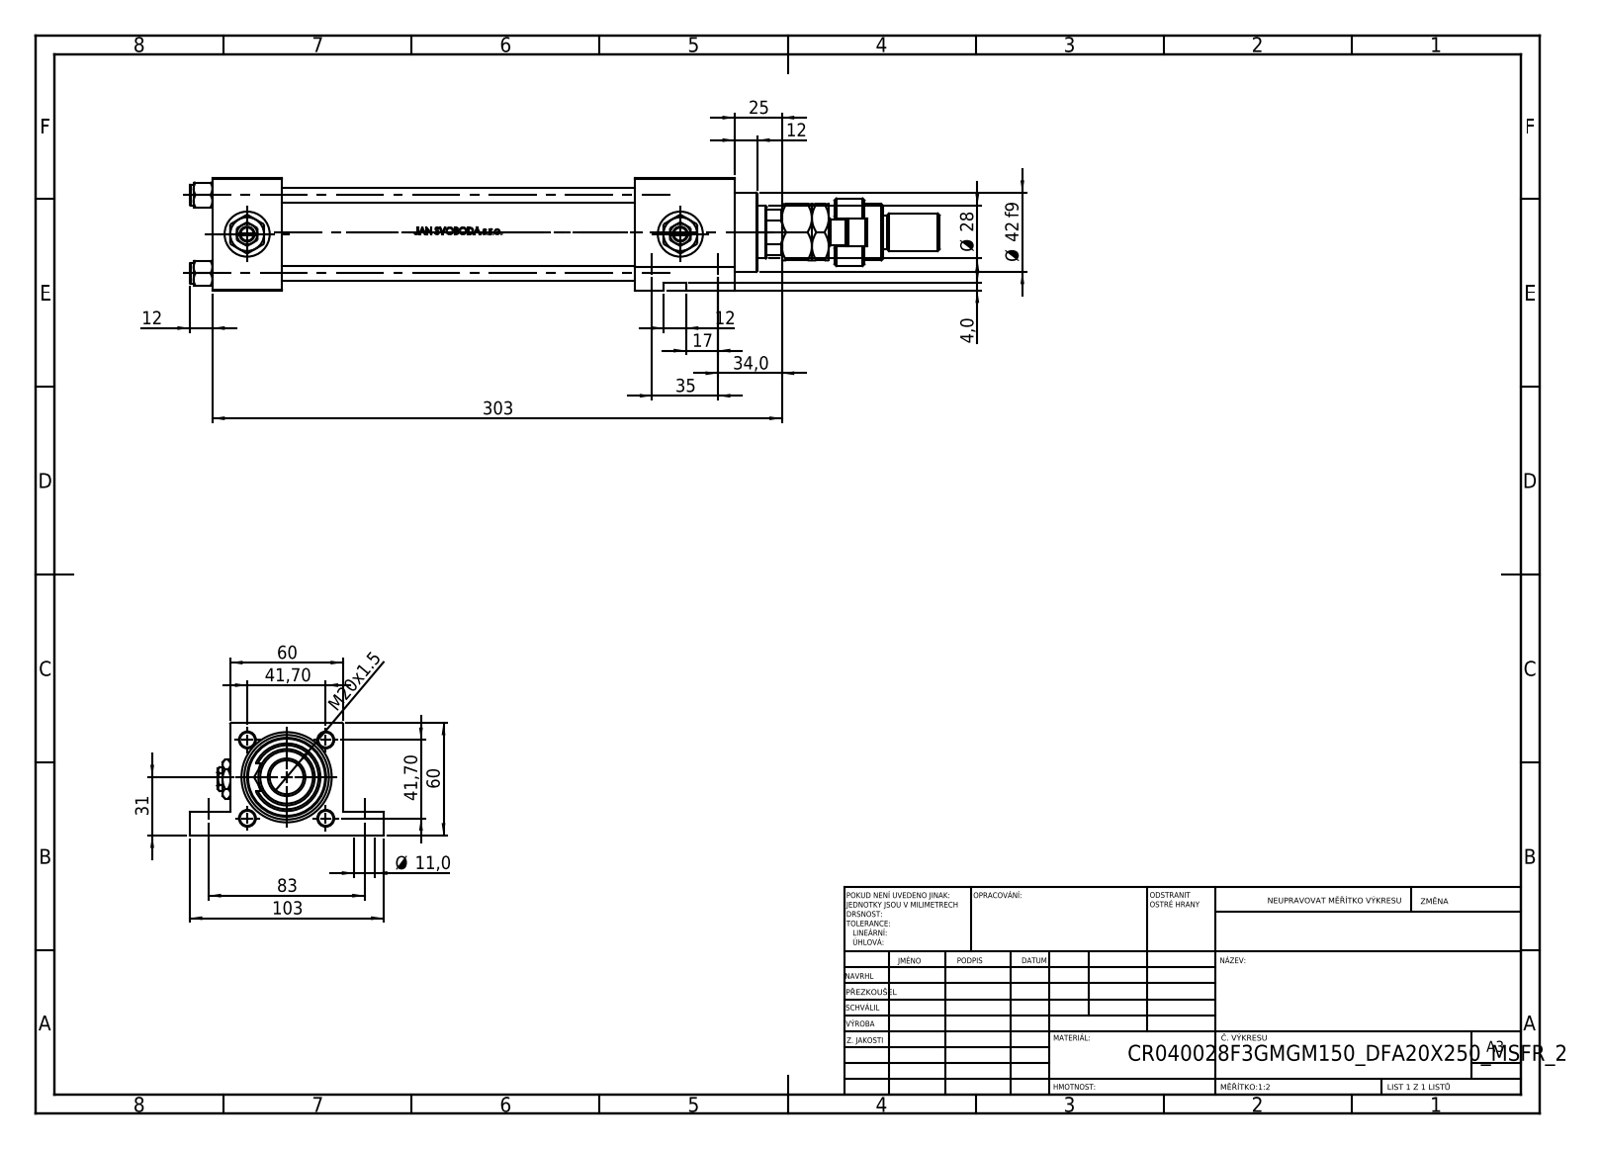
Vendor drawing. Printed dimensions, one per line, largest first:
303
103
83
60
60
Ø 42 f9
41,70
41,70
35
34,0
31
Ø 28
25
M20x1.5
17
12
12
12
Ø 11,0
4,0
